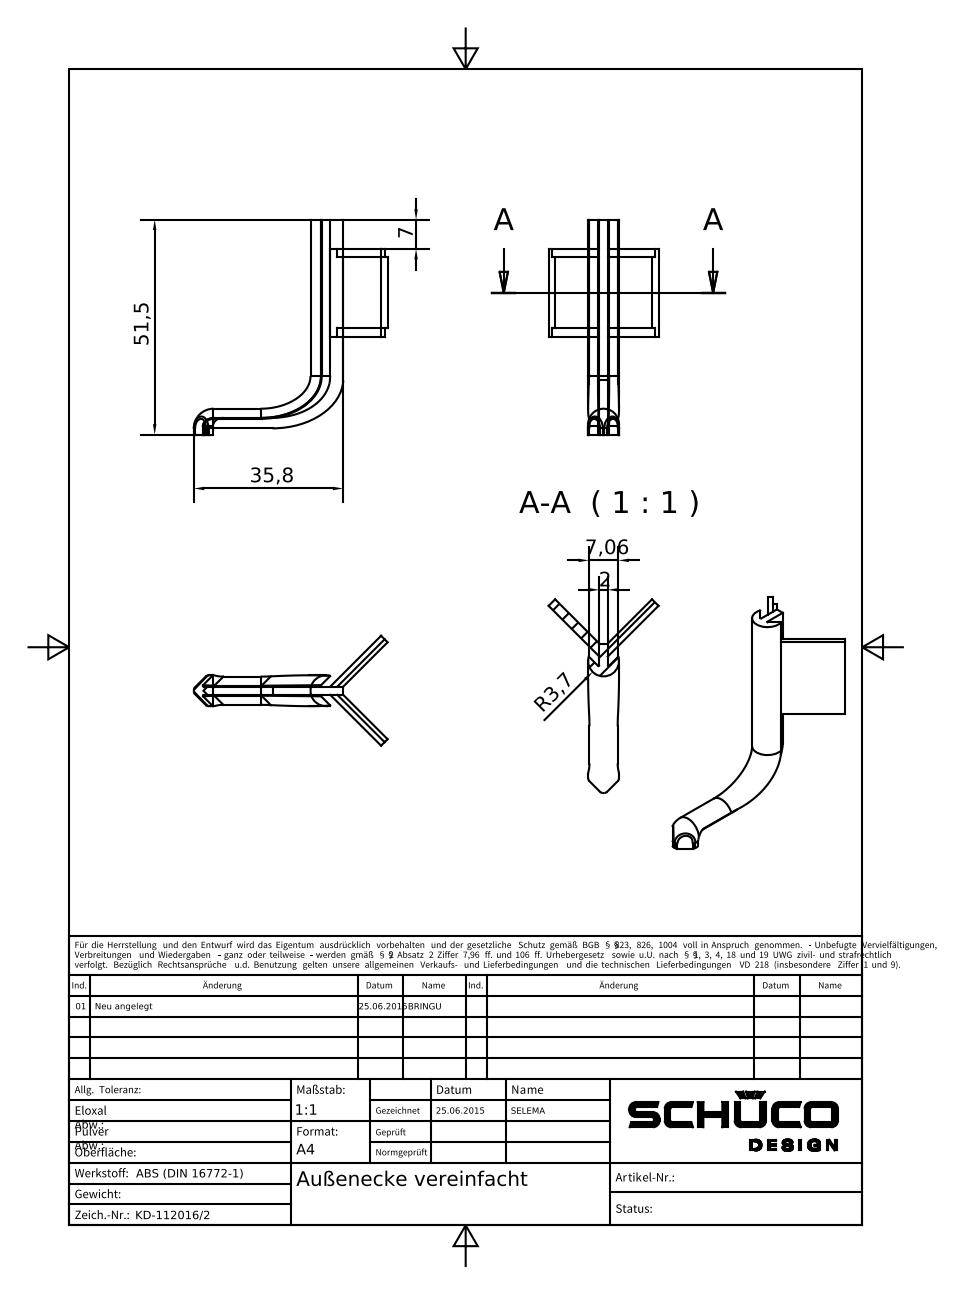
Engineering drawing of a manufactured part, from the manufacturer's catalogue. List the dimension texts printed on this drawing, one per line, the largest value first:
51,5
35,8
7,06
7
R3,7
2
